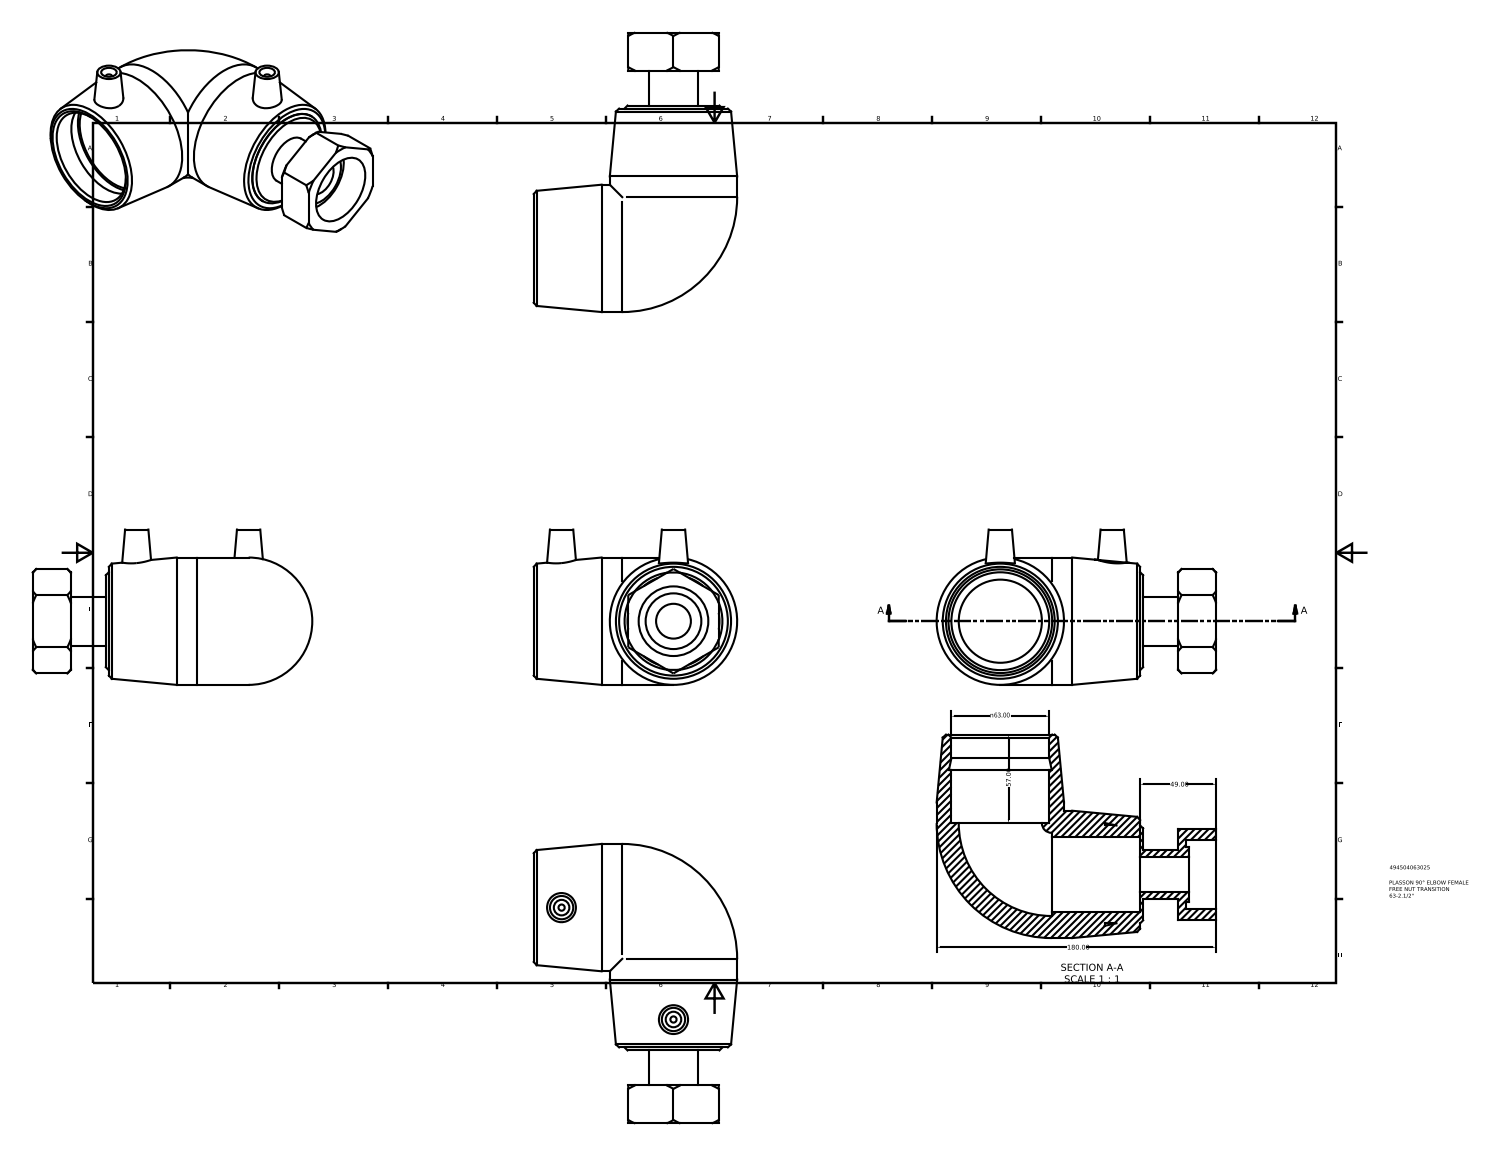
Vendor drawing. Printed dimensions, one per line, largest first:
180.00
n63.00
57.00
49.00
